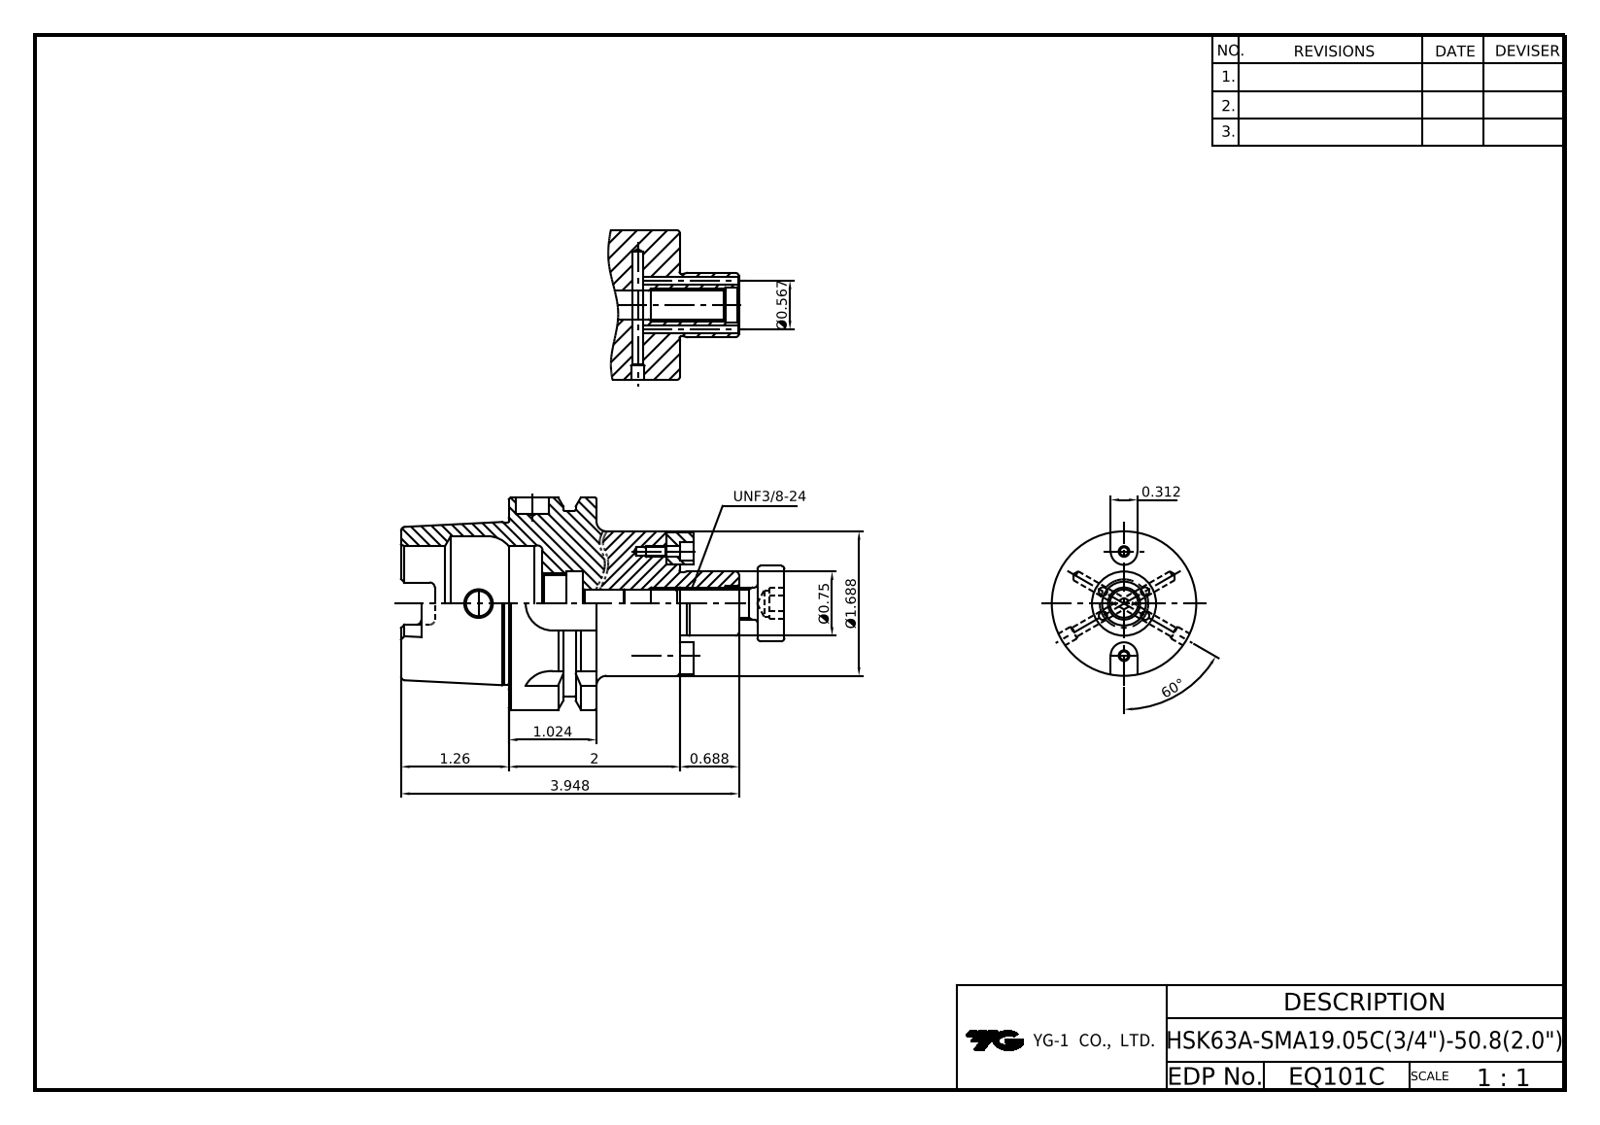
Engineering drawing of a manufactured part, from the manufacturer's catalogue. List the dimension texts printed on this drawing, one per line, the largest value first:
60°
3.948
2
Ø1.688
1.26
1.024
Ø0.75
0.688
Ø0.567
0.312
